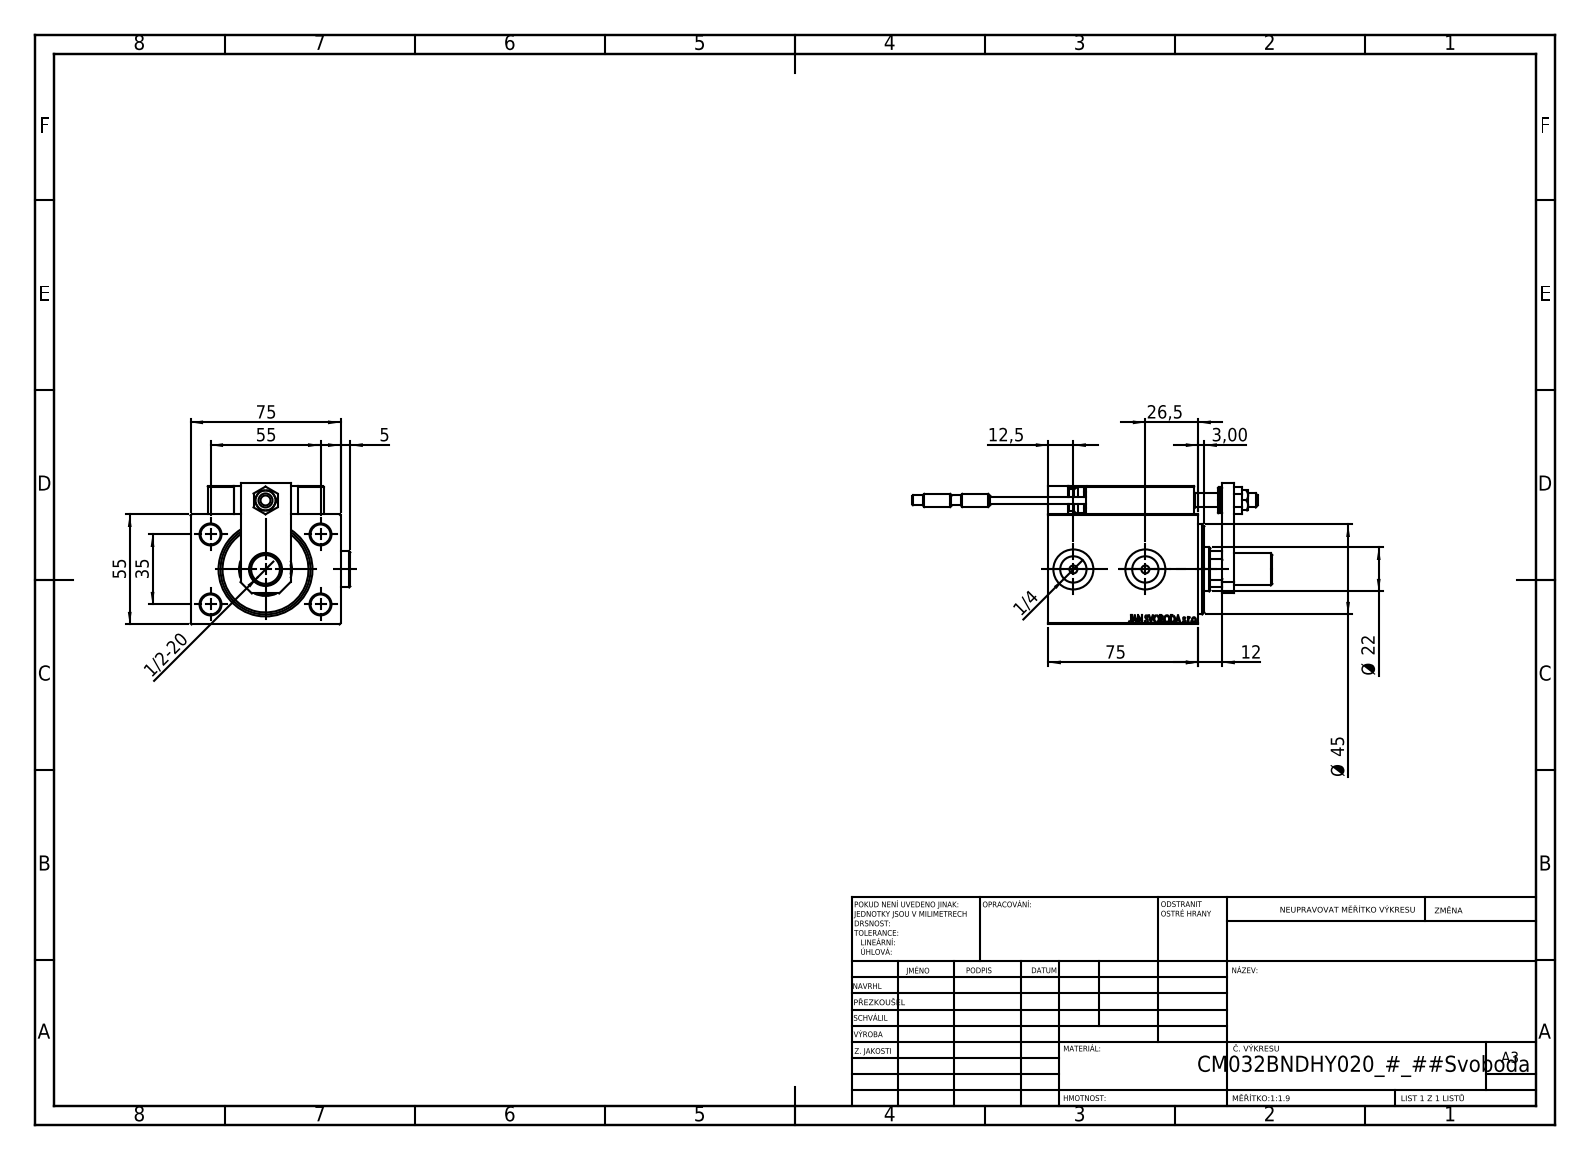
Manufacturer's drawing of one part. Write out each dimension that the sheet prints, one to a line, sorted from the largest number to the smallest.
75
75
55
55
Ø 45
35
26,5
Ø 22
12,5
12
5
3,00
1/2-20
1/4
